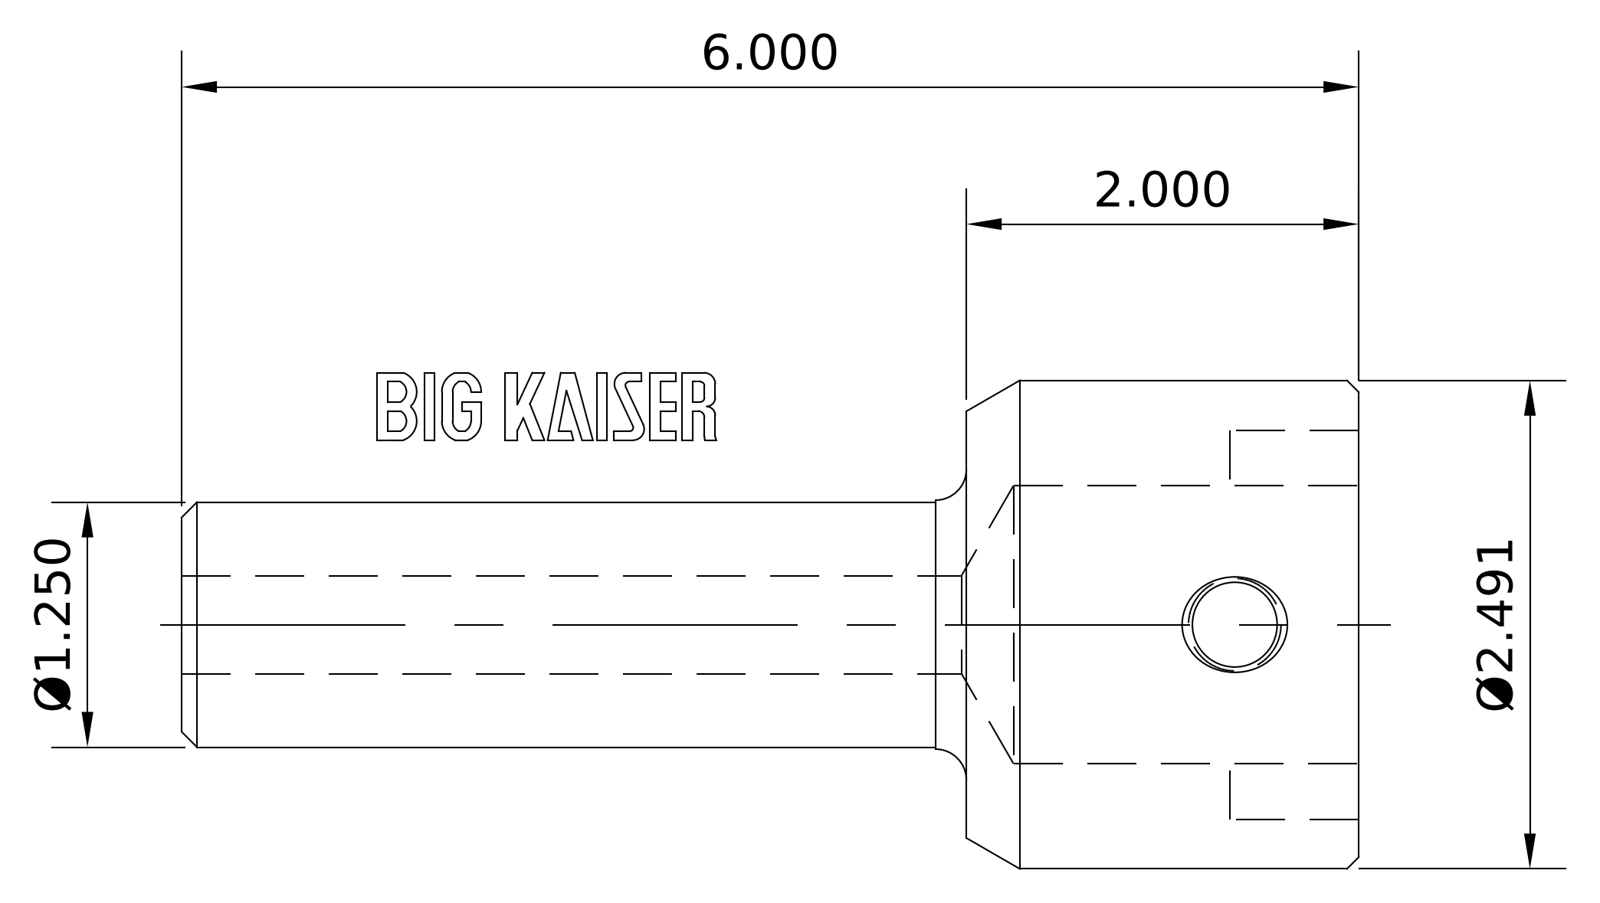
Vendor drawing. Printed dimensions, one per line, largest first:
6.000
Ø2.491
2.000
Ø1.250
